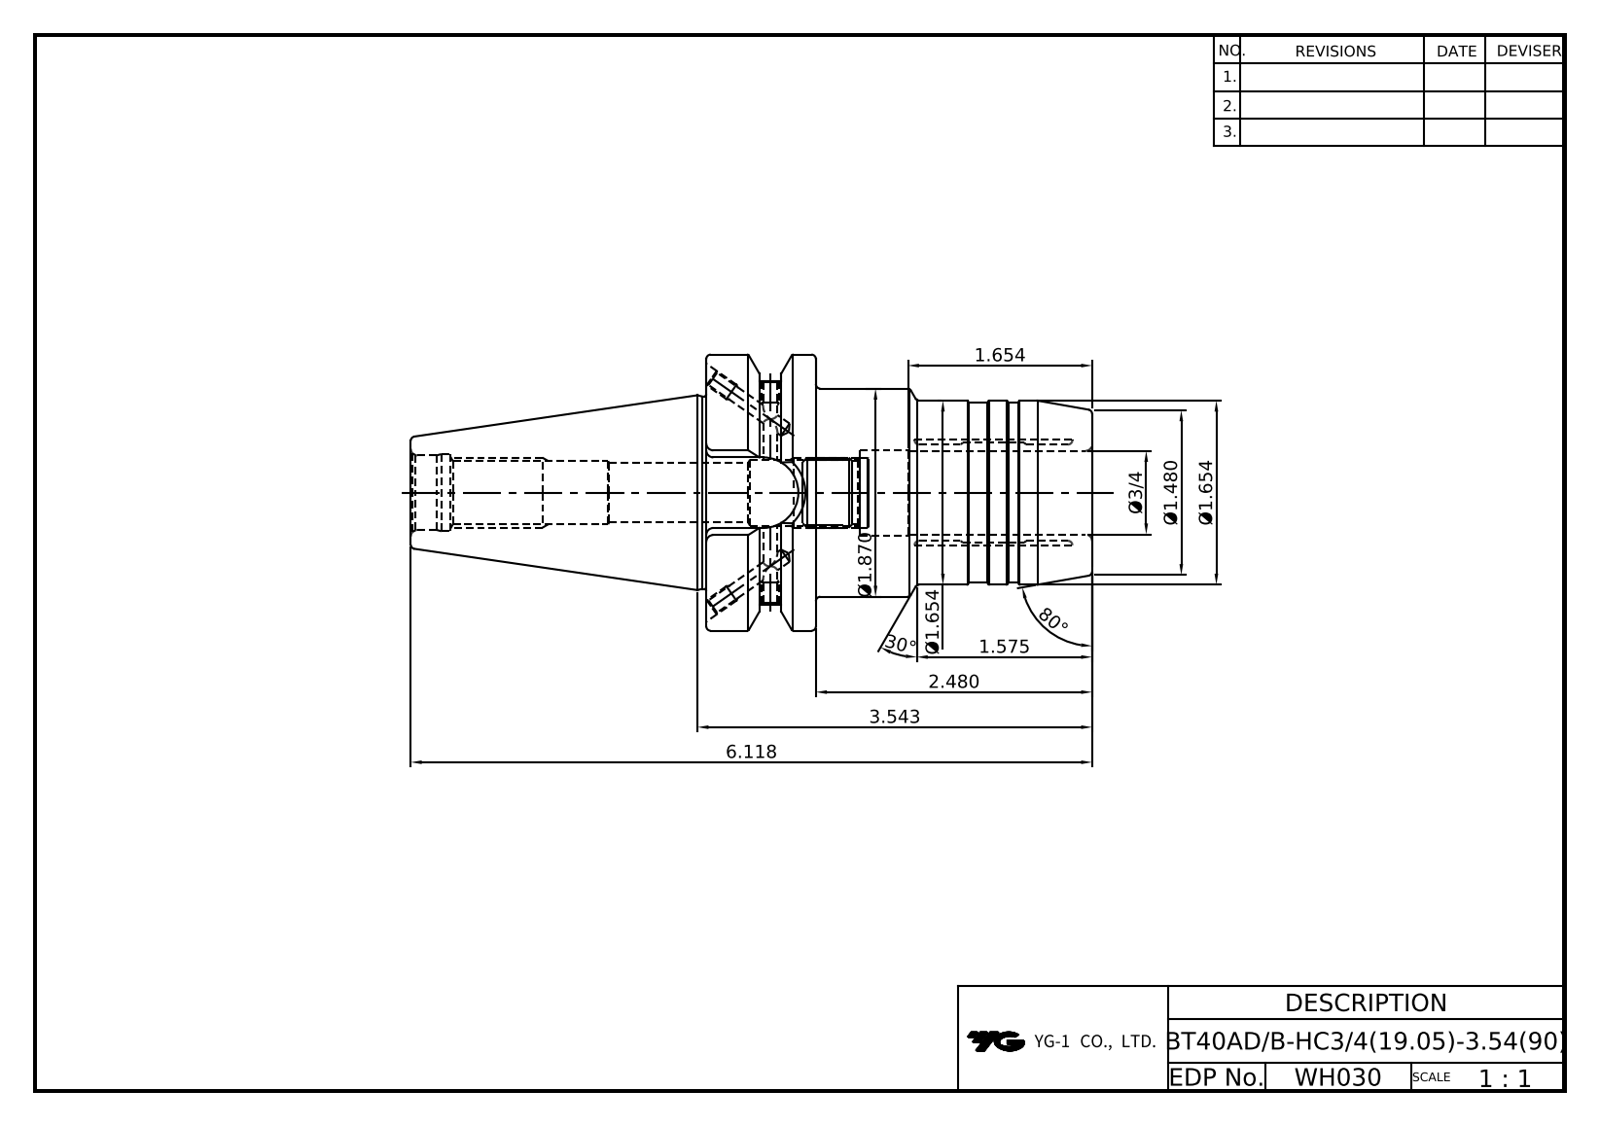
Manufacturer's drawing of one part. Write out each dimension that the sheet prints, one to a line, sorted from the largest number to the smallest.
80°
30°
6.118
3.543
2.480
Ø1.870
Ø1.654
Ø1.654
1.654
1.575
Ø1.480
Ø3/4
